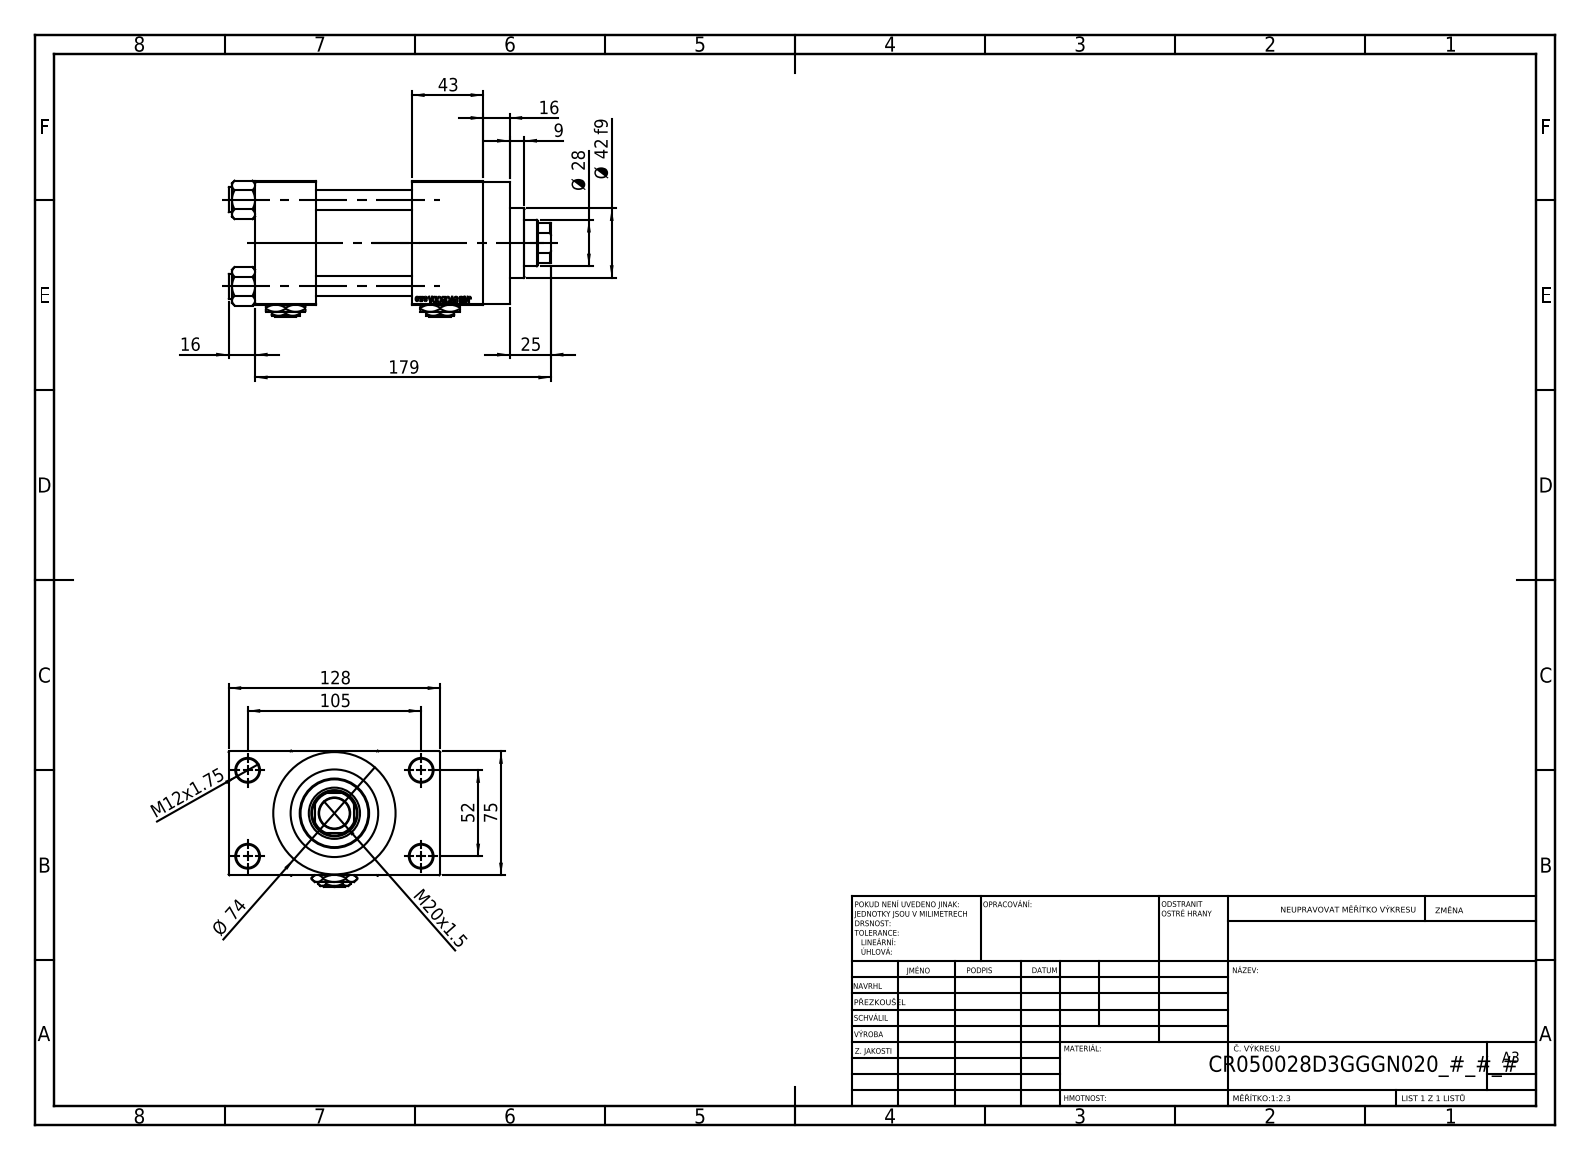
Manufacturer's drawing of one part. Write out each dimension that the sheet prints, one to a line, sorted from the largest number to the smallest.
179
128
105
75
Ø 74
52
43
Ø 42 f9
Ø 28
25
M20x1.5
16
16
M12x1.75
9
